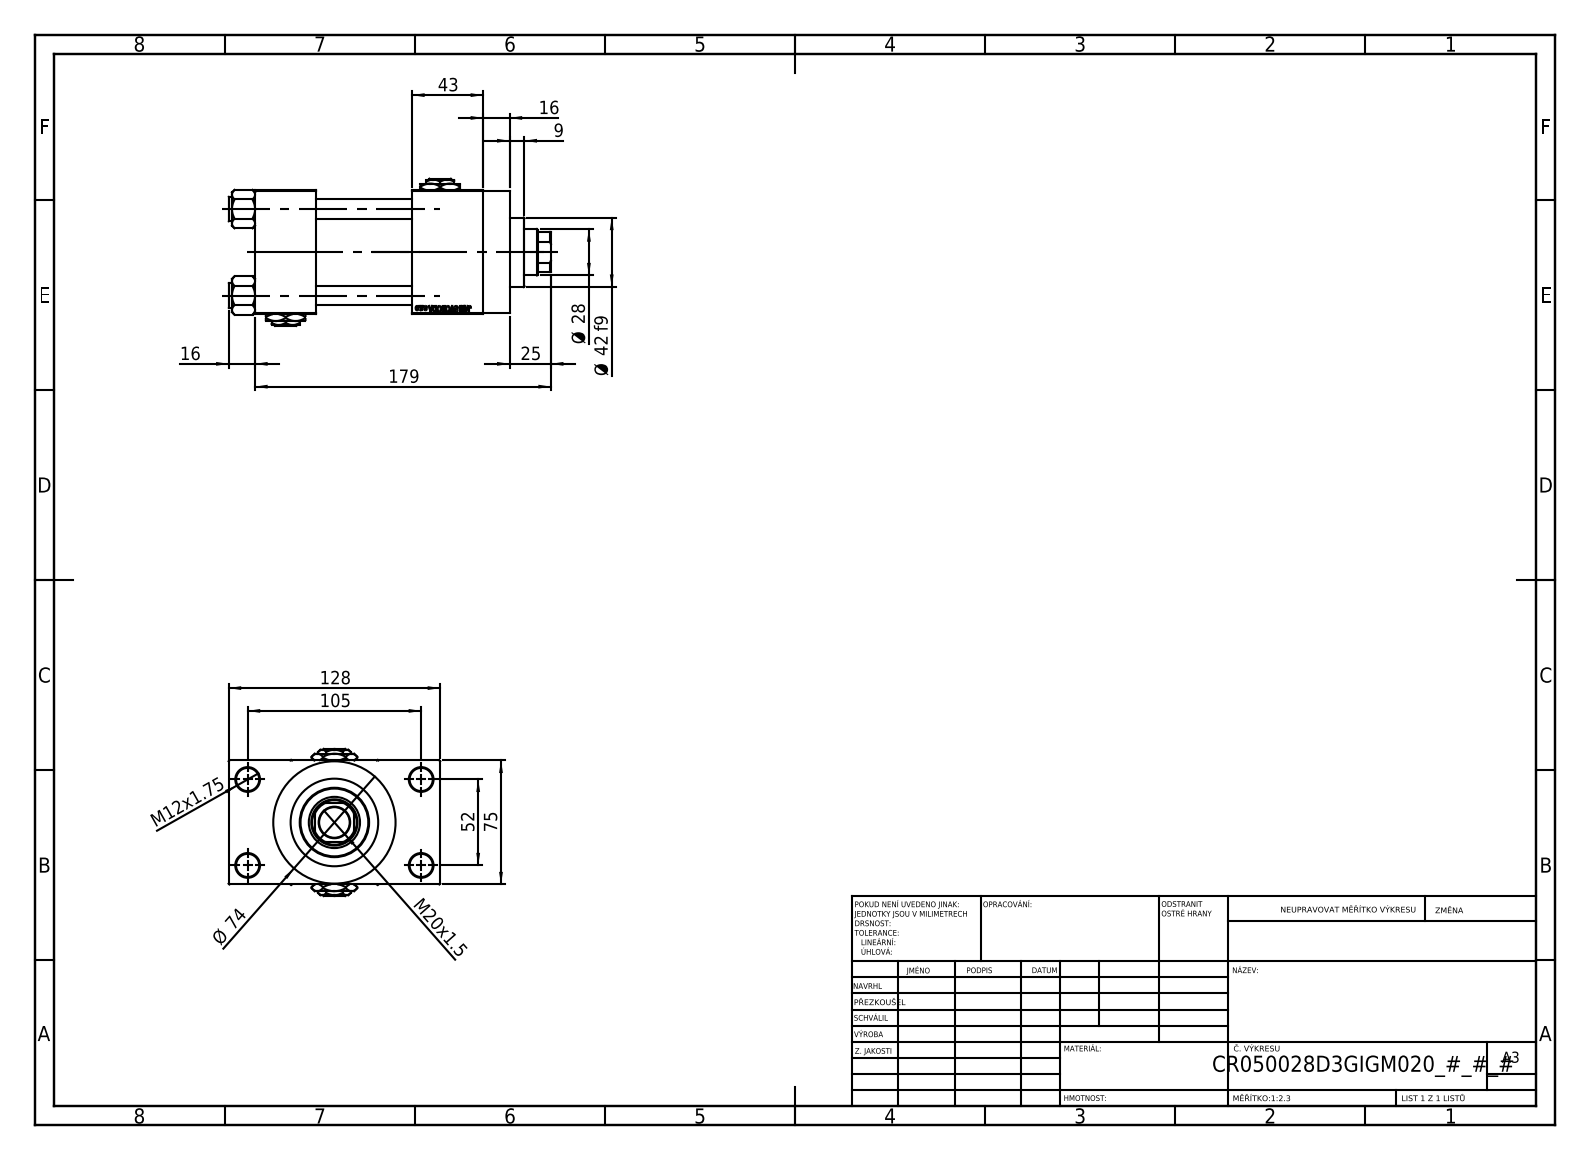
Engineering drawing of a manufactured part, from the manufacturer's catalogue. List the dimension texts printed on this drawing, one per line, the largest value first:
179
128
105
75
Ø 74
52
43
Ø 42 f9
Ø 28
25
M20x1.5
16
16
M12x1.75
9
